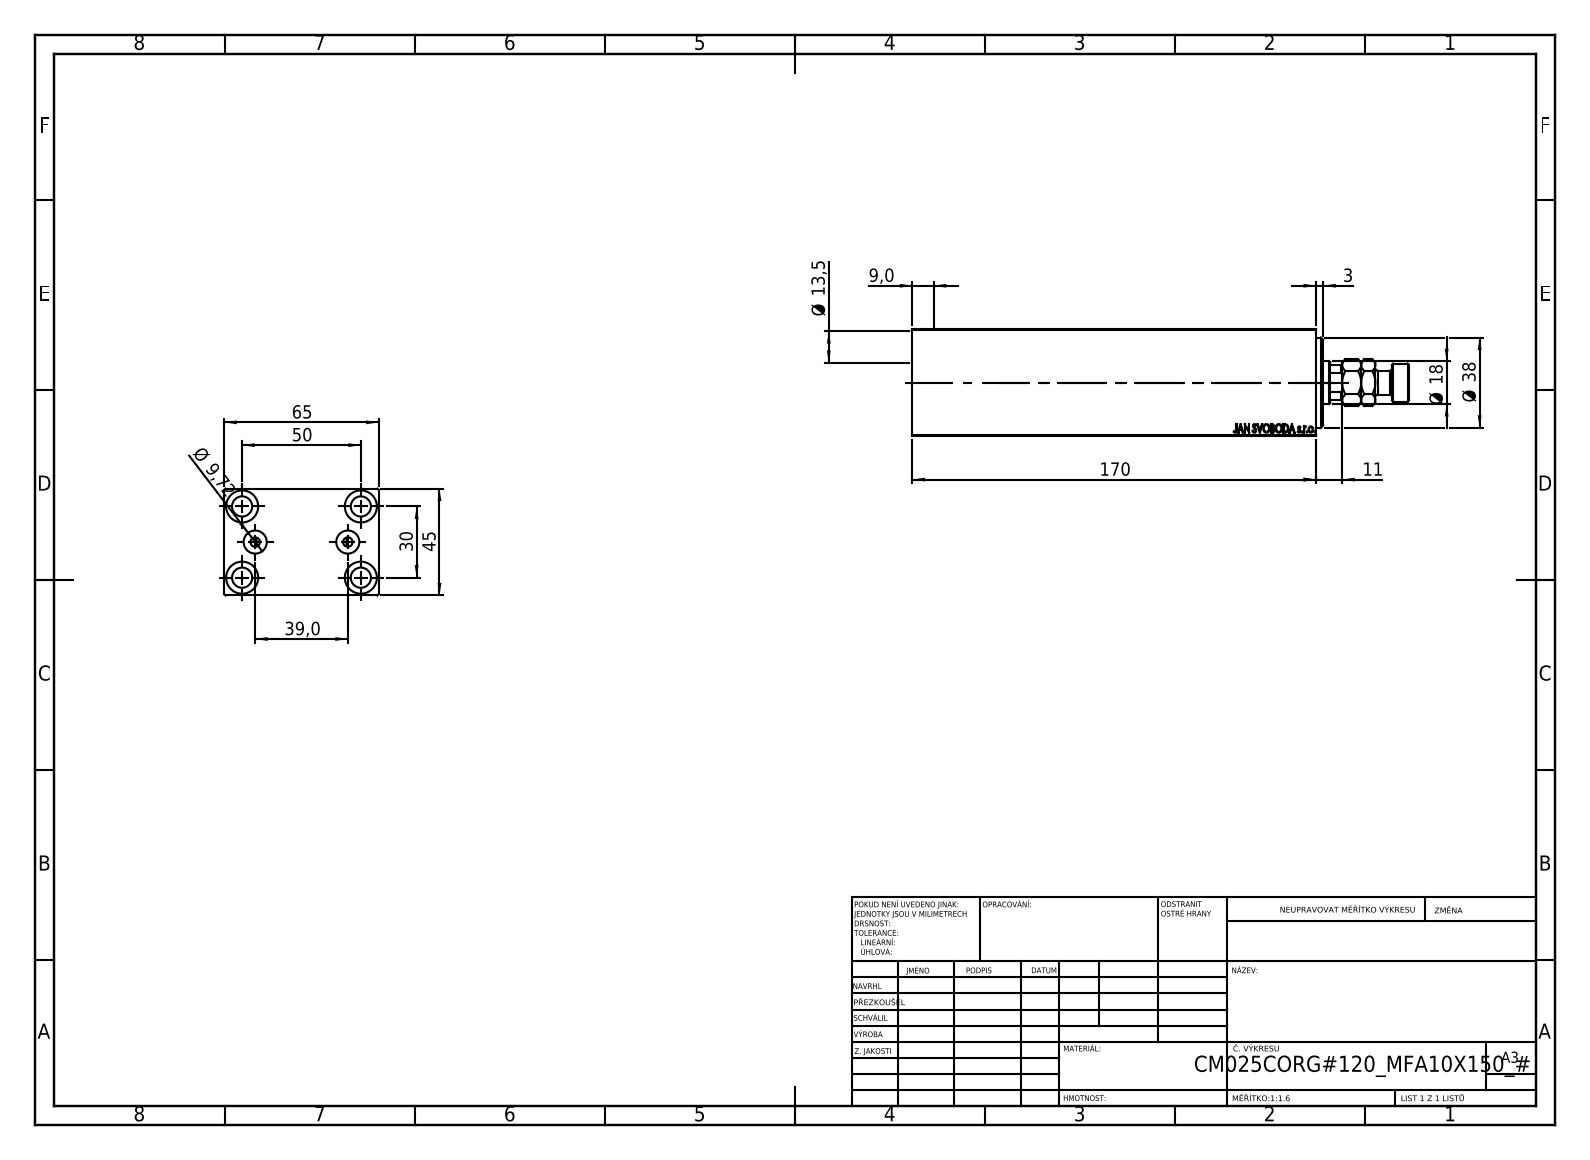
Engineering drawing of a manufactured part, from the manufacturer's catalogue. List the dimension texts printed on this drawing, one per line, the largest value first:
170
65
50
45
39,0
Ø 38
30
Ø 18
Ø 13,5
11
Ø 9,72
9,0
3
